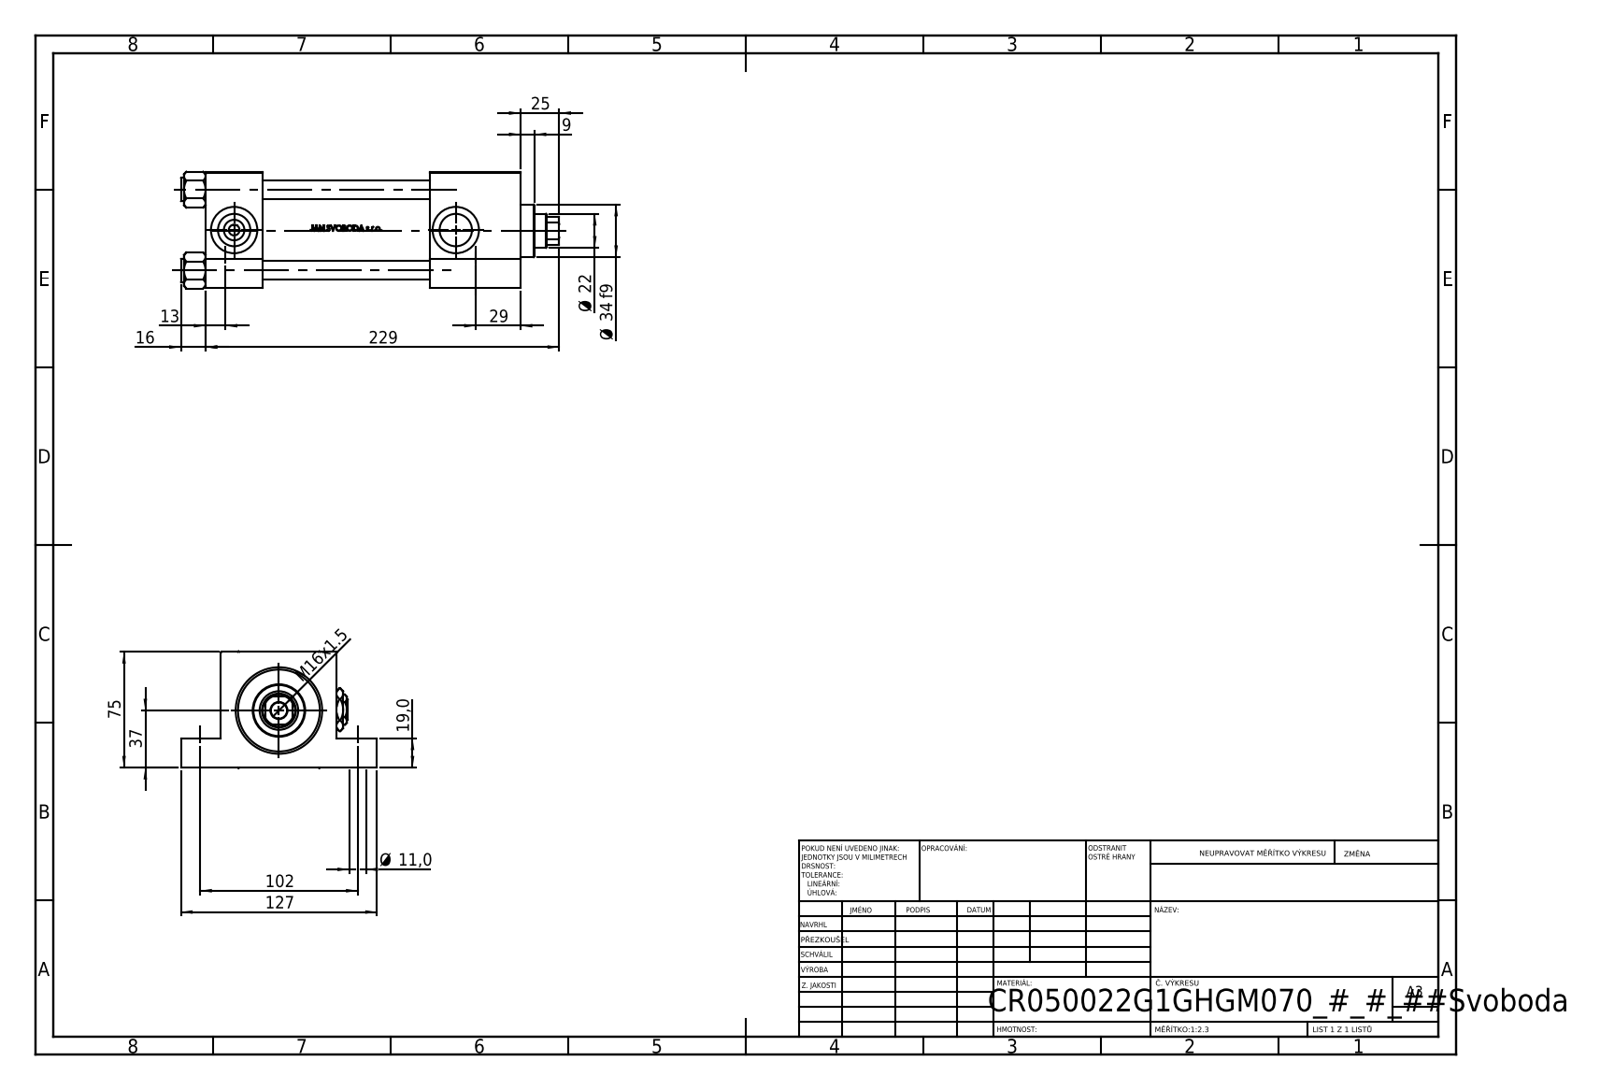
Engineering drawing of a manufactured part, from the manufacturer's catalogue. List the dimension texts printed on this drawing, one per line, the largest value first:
229
127
102
75
37
Ø 34 f9
29
25
Ø 22
19,0
16
M16x1.5
13
Ø 11,0
9
